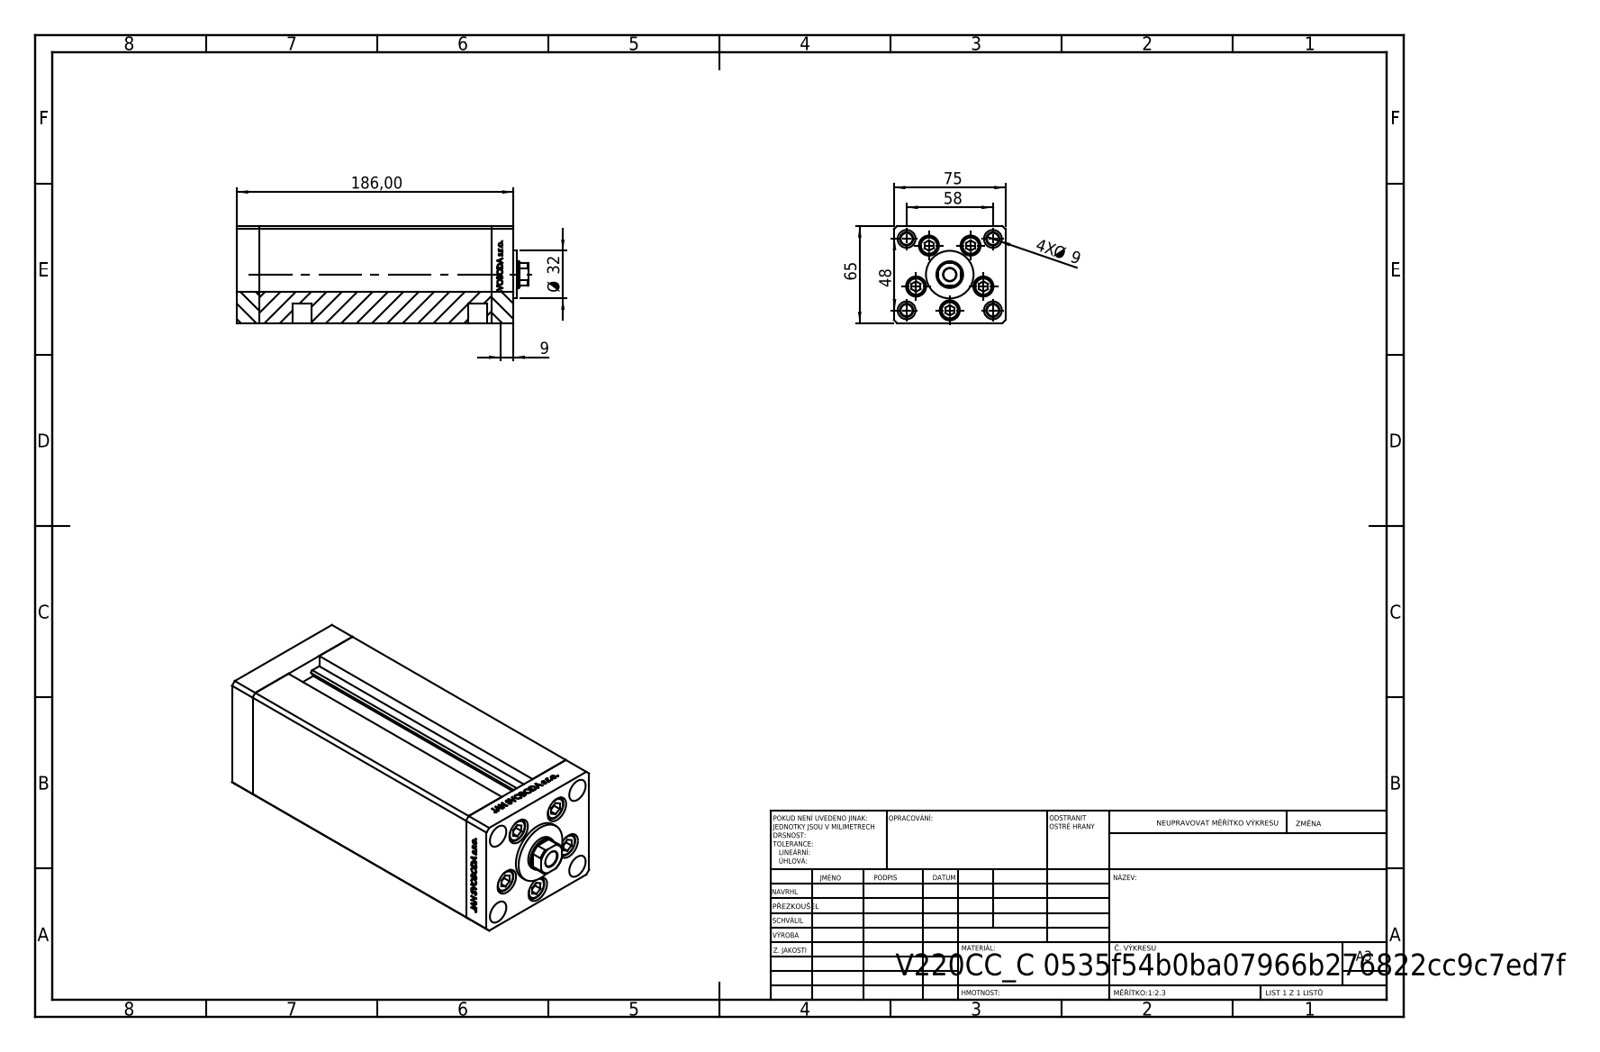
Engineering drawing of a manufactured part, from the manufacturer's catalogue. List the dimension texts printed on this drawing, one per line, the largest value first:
186,00
75
65
58
48
Ø 32
9
4X Ø 9
